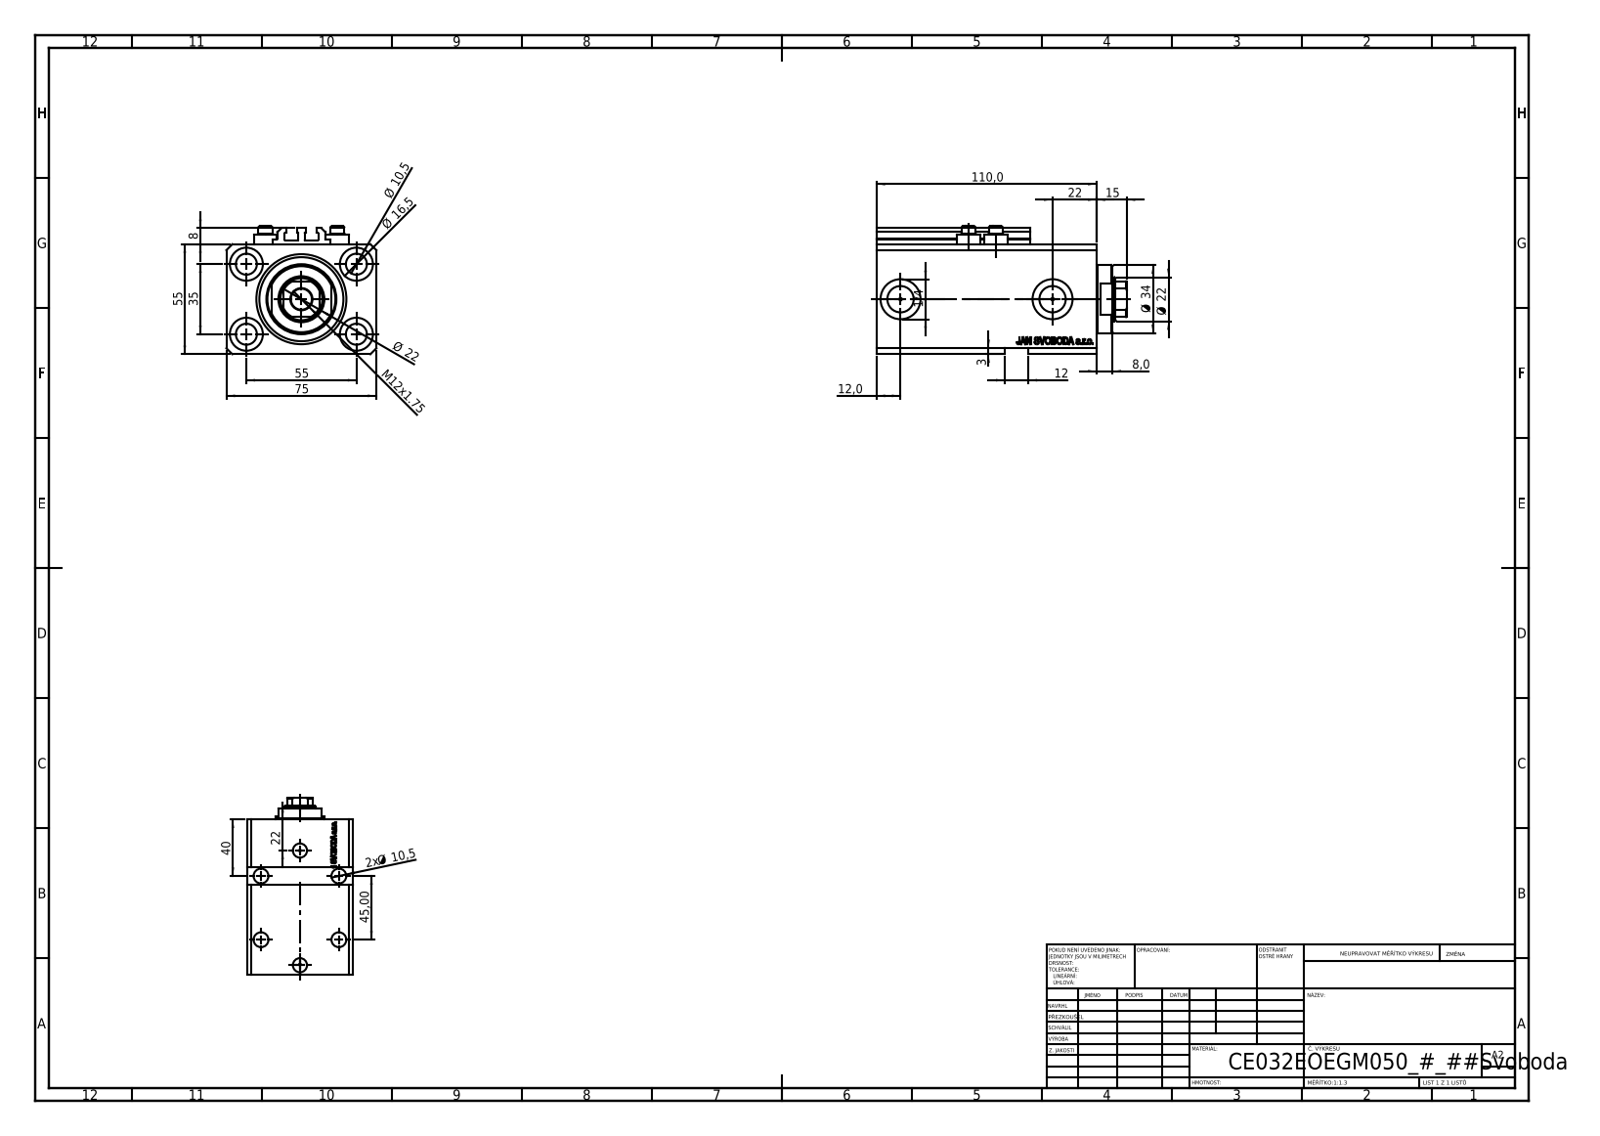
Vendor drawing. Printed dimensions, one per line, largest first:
110,0
75
55
55
45,00
40
35
Ø 34
Ø 22
22
Ø 22
22
Ø 16,5
15
M12x1.75
12,0
12
Ø 10,5
2x Ø 10,5
8
8,0
3
1/4
